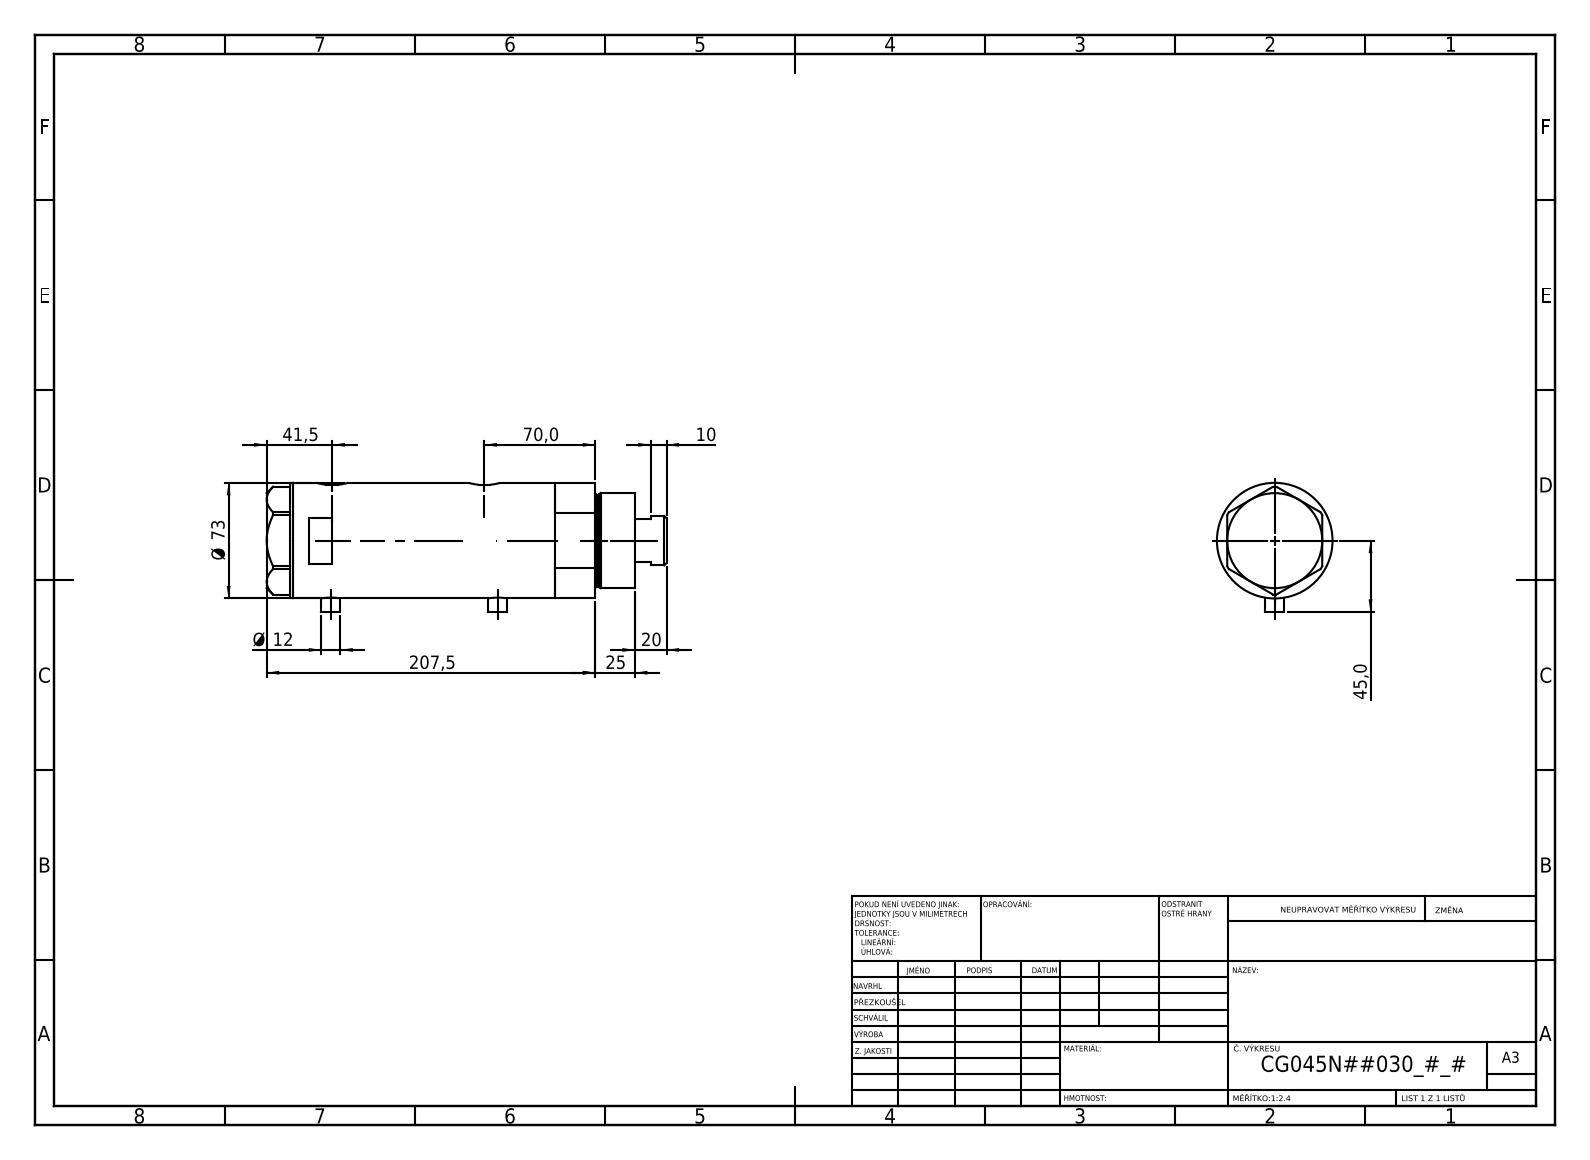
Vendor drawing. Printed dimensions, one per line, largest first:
207,5
Ø 73
70,0
45,0
41,5
25
20
Ø 12
10
